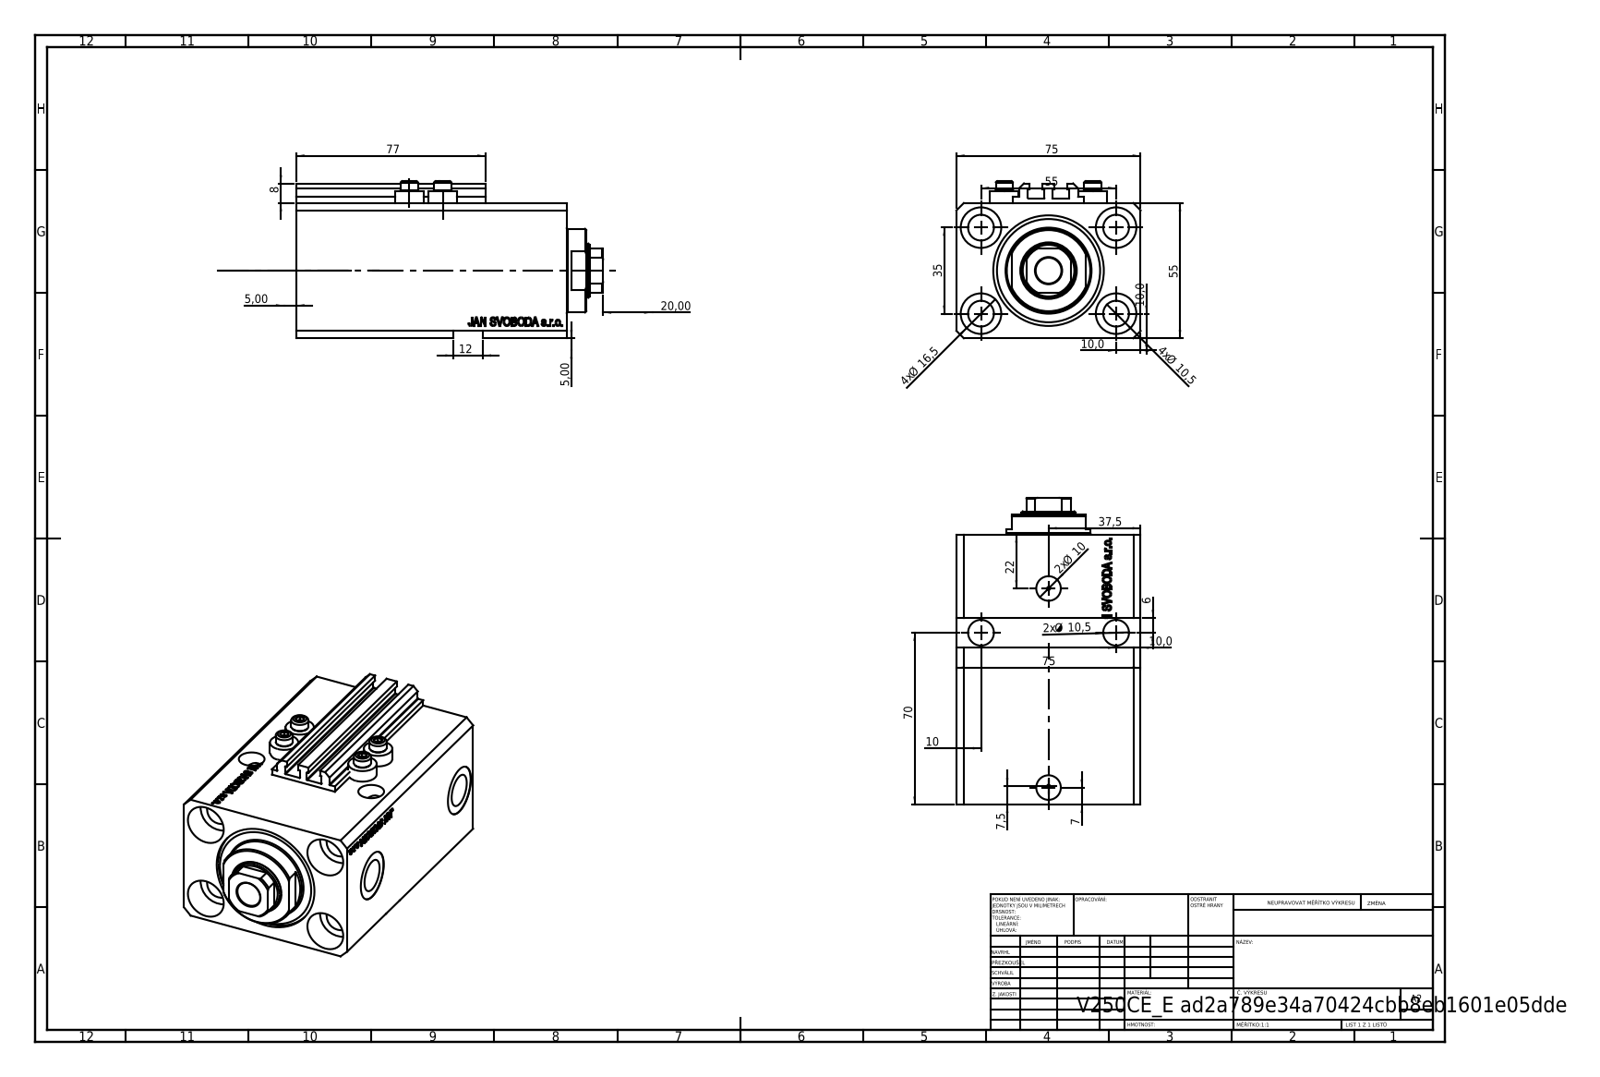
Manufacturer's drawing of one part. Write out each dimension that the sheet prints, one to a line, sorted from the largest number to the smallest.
77
75
75
70
55
55
37,5
35
22
20,00
4x Ø 16,5
12
4x Ø 10,5
2x Ø 10,5
10,0
10,0
2x Ø 10
10,0
10
8
7,5
7
6
5,00
5,00
